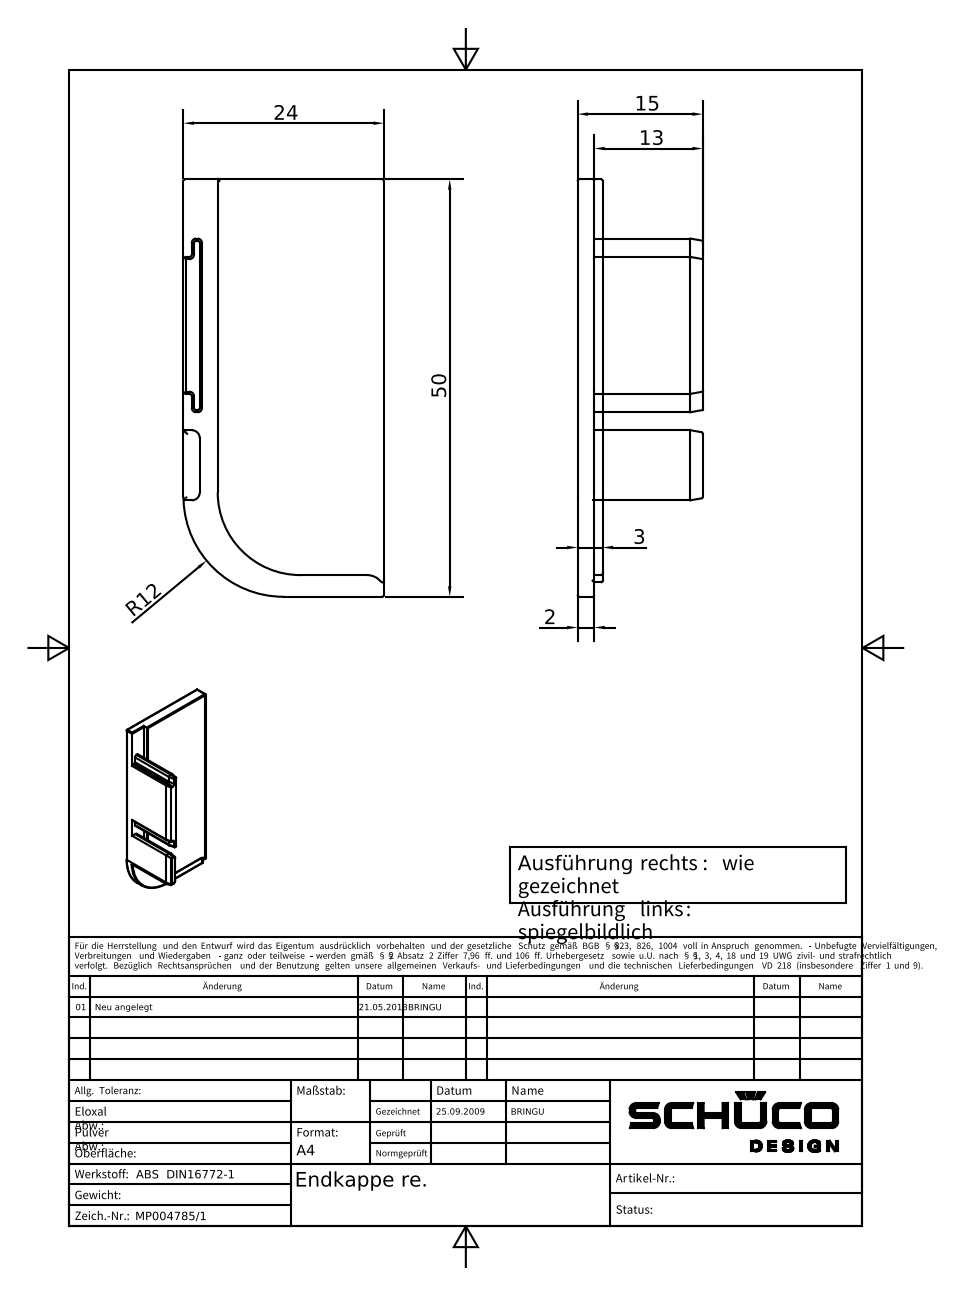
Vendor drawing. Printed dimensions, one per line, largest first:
50
24
15
13
R12
3
2
